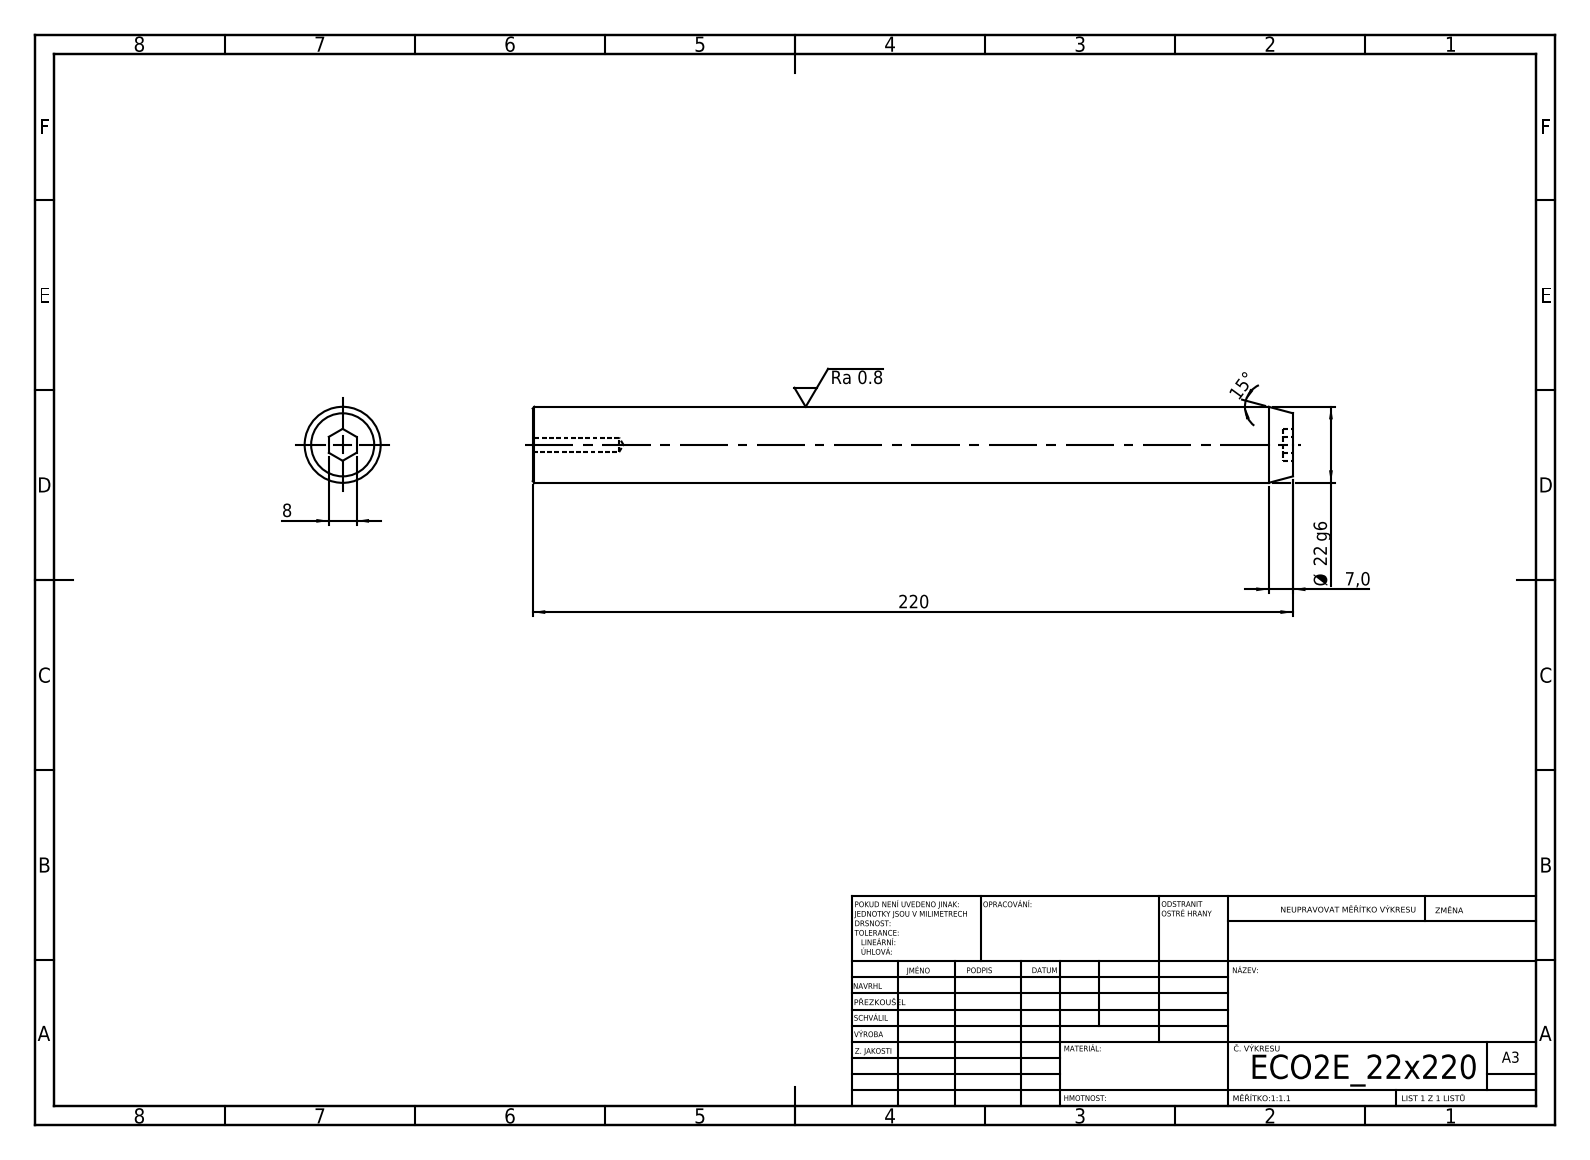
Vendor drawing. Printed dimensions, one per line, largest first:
220
Ø 22 g6
15°
8
7,0
